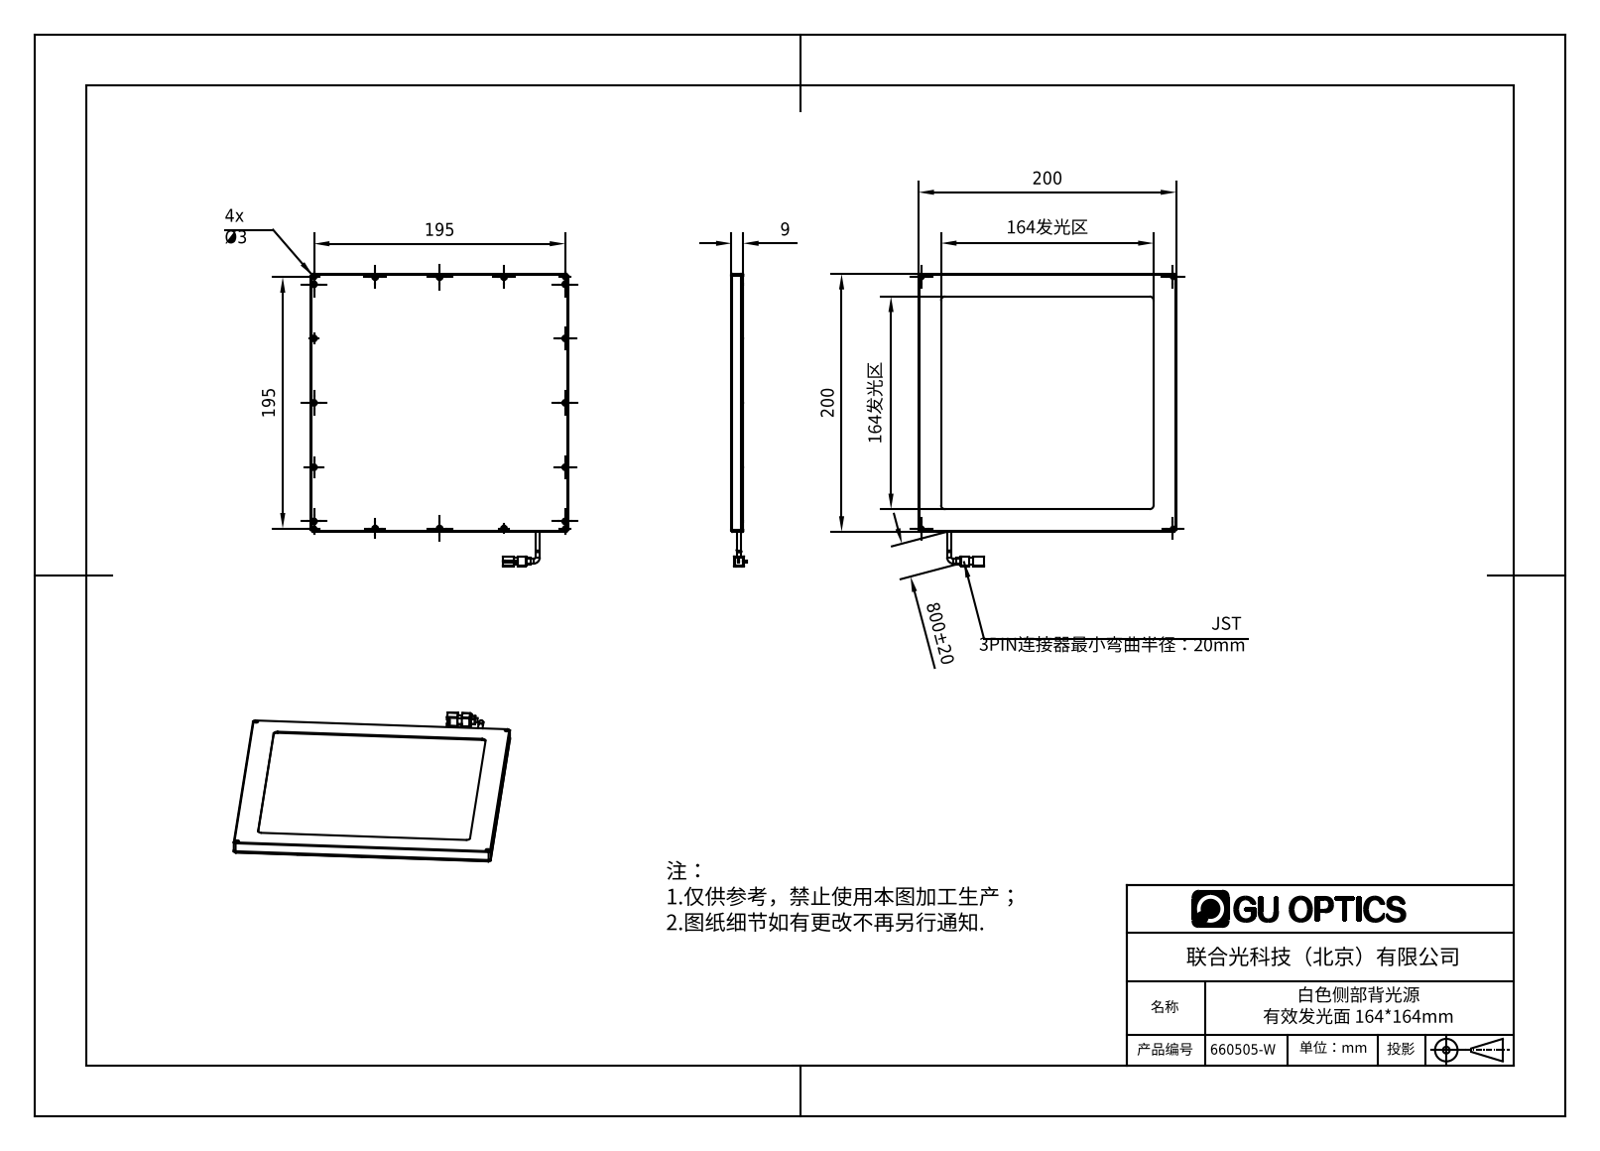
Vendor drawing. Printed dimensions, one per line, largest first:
800±20
200
200
195
195
164发光区
164发光区
9
